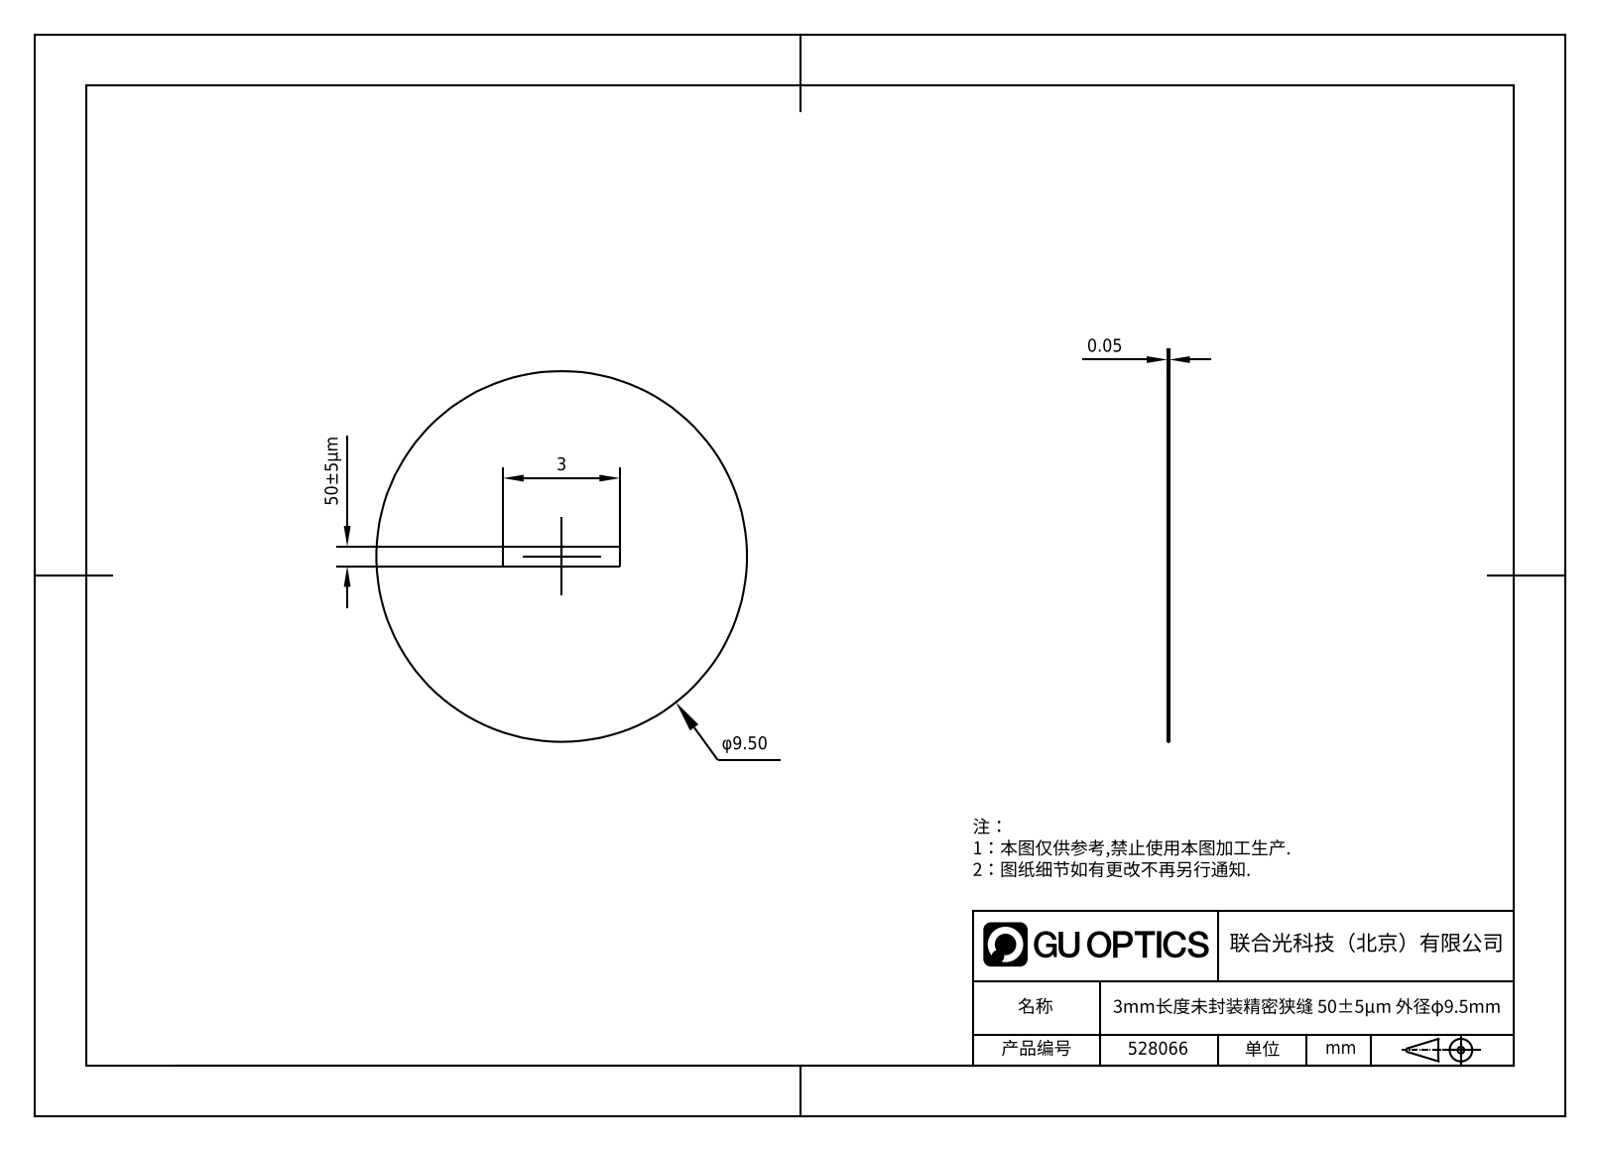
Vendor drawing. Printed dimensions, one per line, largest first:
50±5μm
3
0.05
